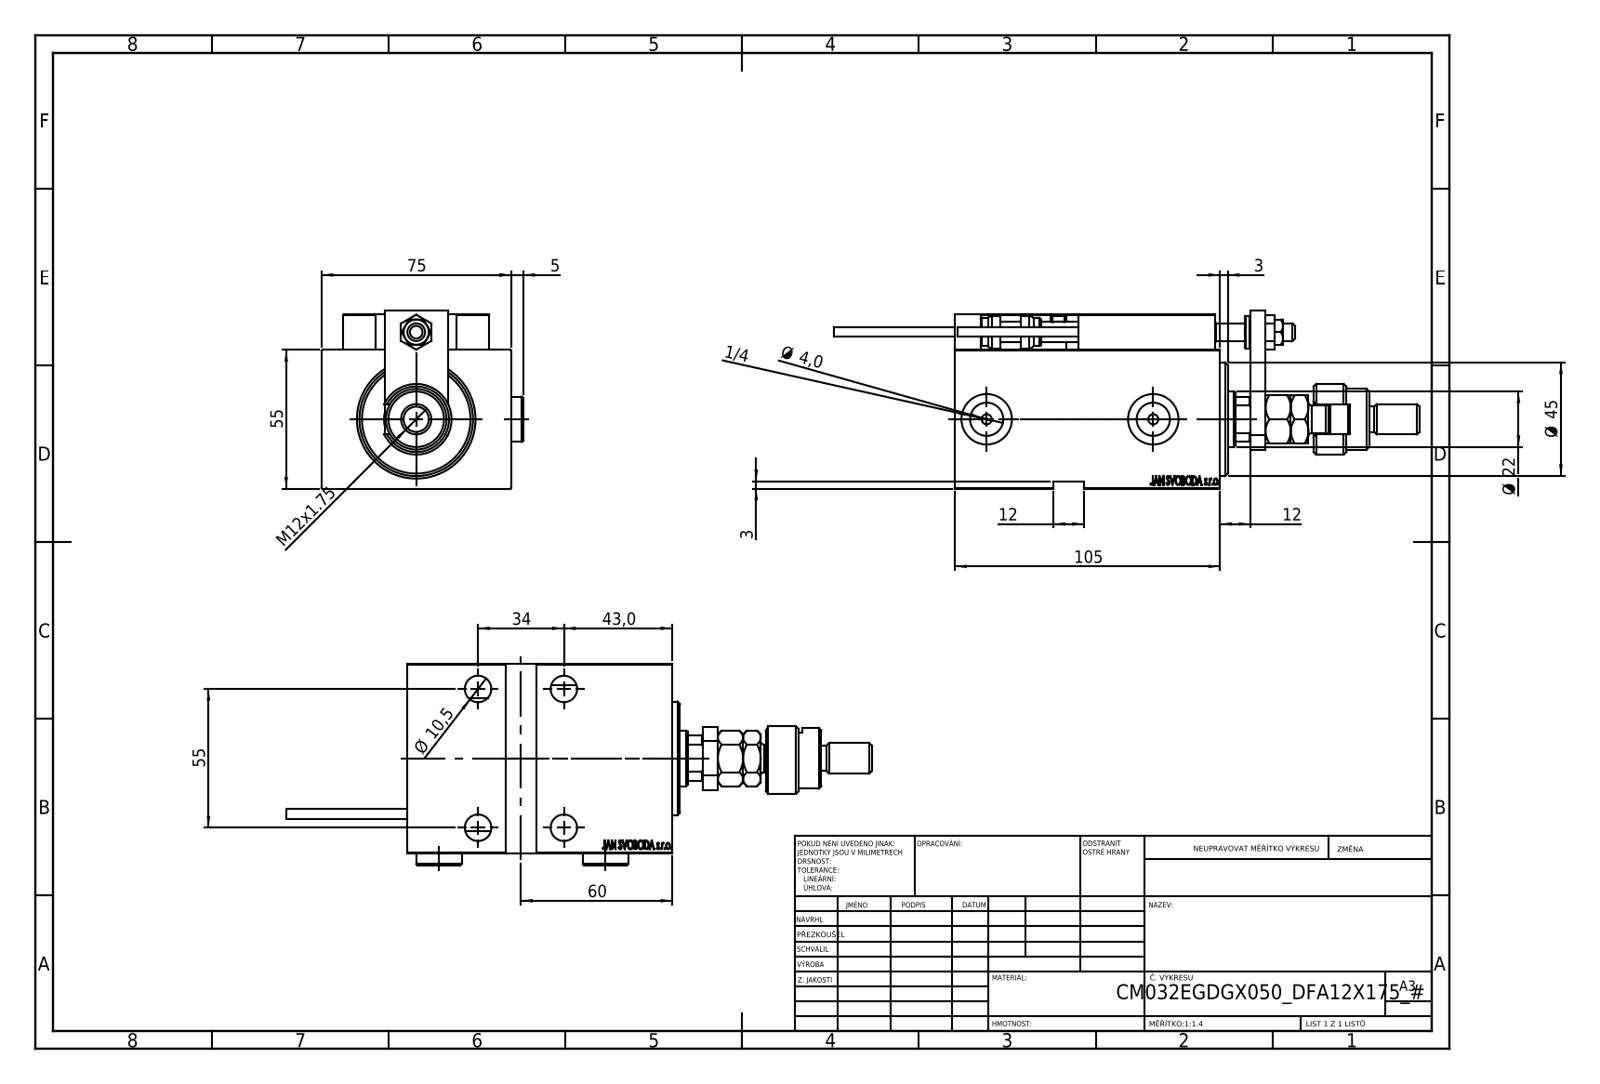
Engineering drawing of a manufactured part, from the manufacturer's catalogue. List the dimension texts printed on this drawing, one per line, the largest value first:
105
75
60
55
55
Ø 45
43,0
34
Ø 22
M12x1.75
12
12
Ø 10,5
5
Ø 4,0
3
3
1/4
